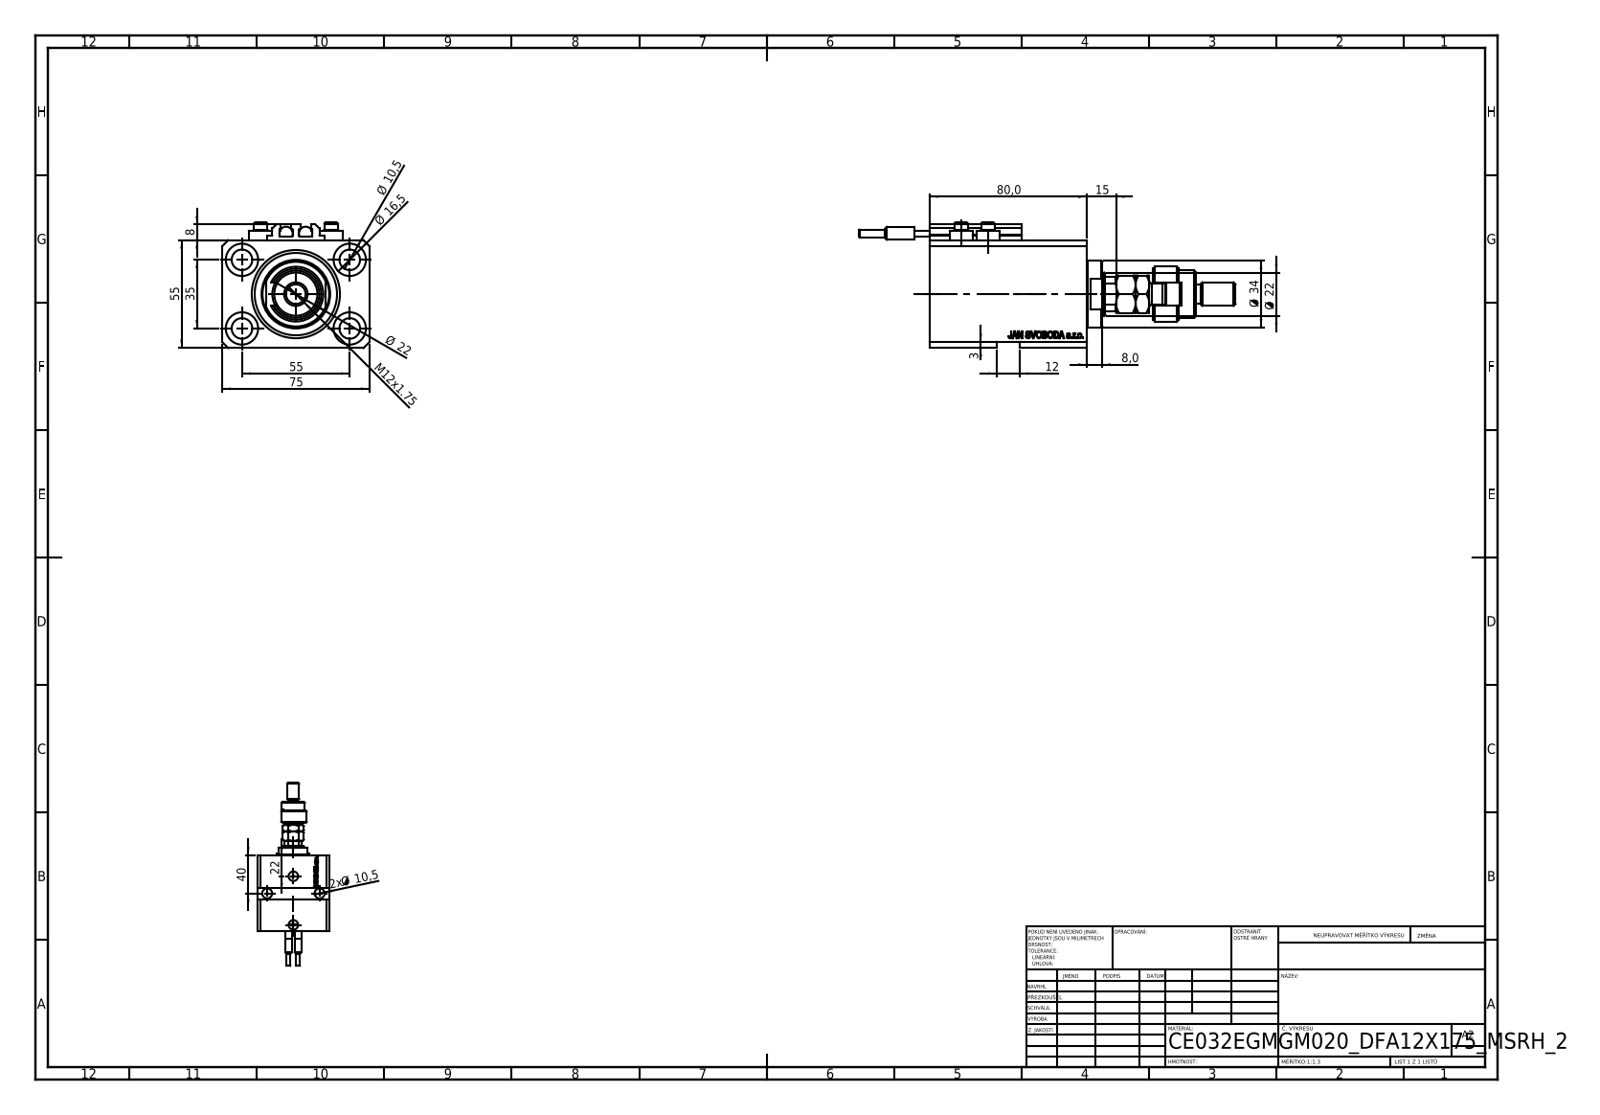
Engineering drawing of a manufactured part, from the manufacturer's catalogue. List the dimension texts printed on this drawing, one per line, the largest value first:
80,0
75
55
55
40
35
Ø 34
Ø 22
Ø 22
22
Ø 16,5
15
M12x1.75
12
Ø 10,5
2x Ø 10,5
8
8,0
3
